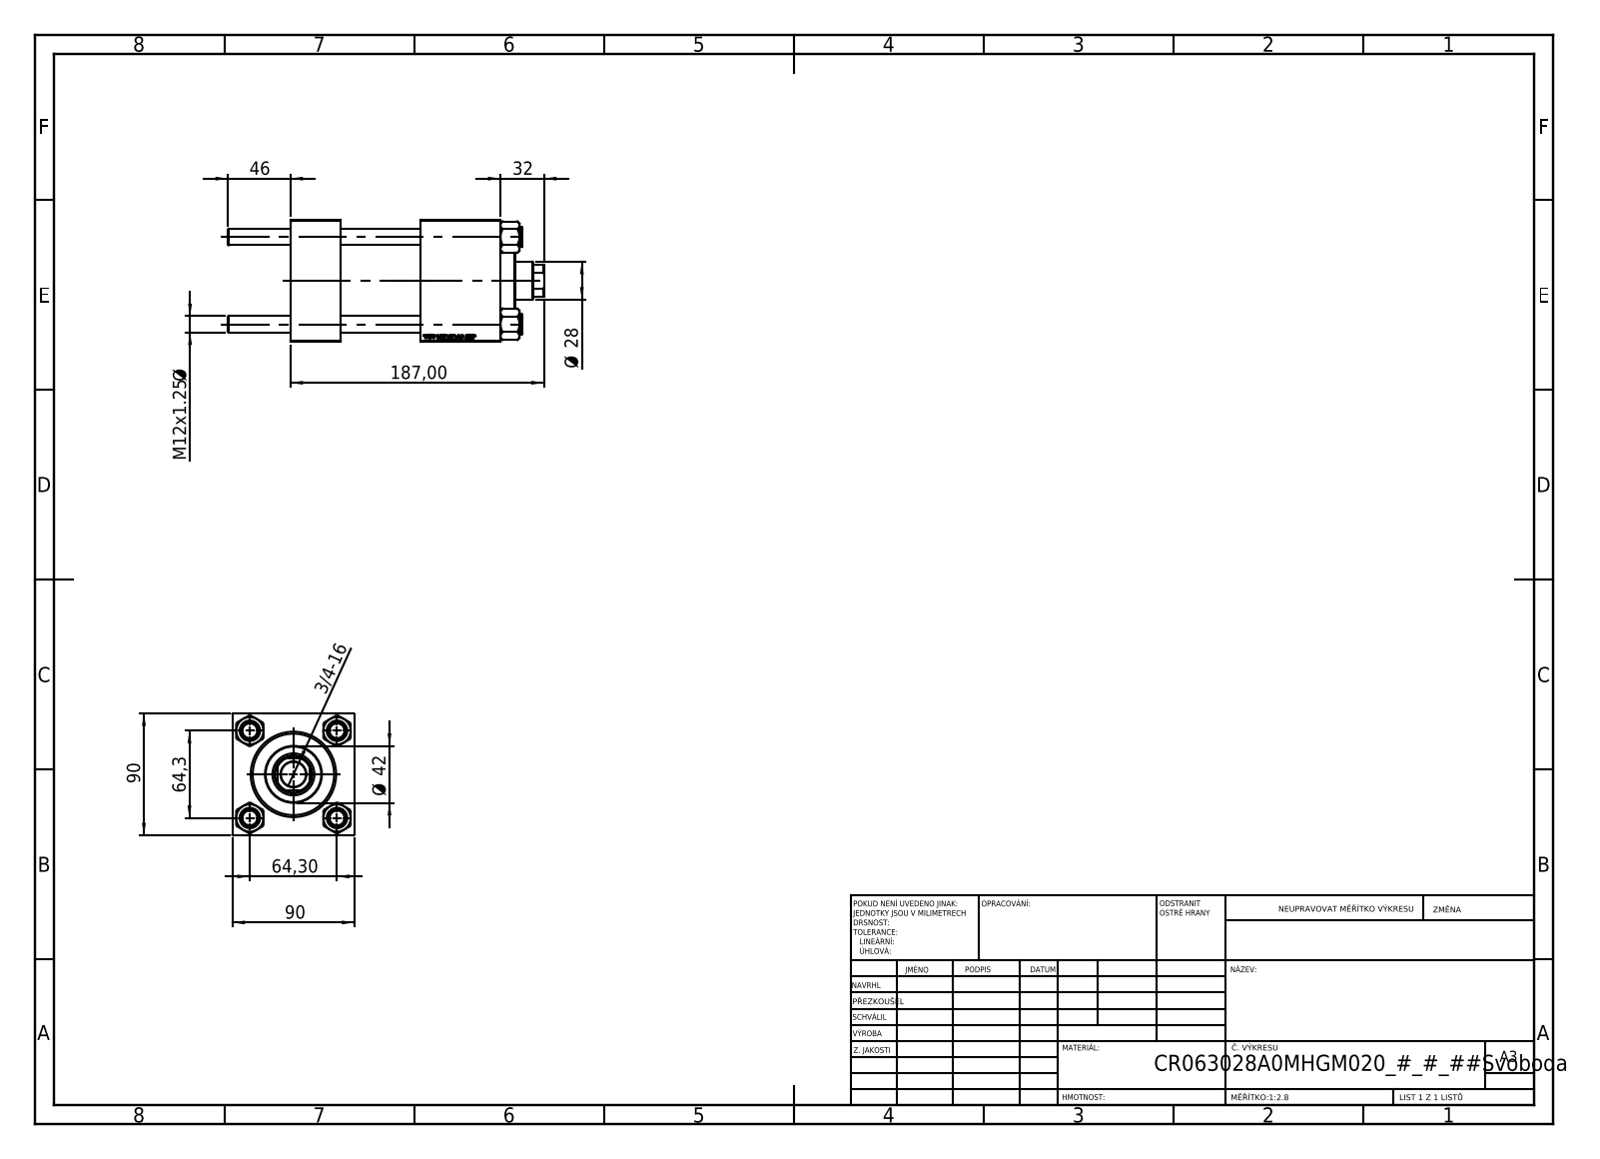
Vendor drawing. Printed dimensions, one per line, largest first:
187,00
90
90
64,3
64,30
46
Ø 42
32
Ø 28
M12x1.25 Ø
3/4-16
